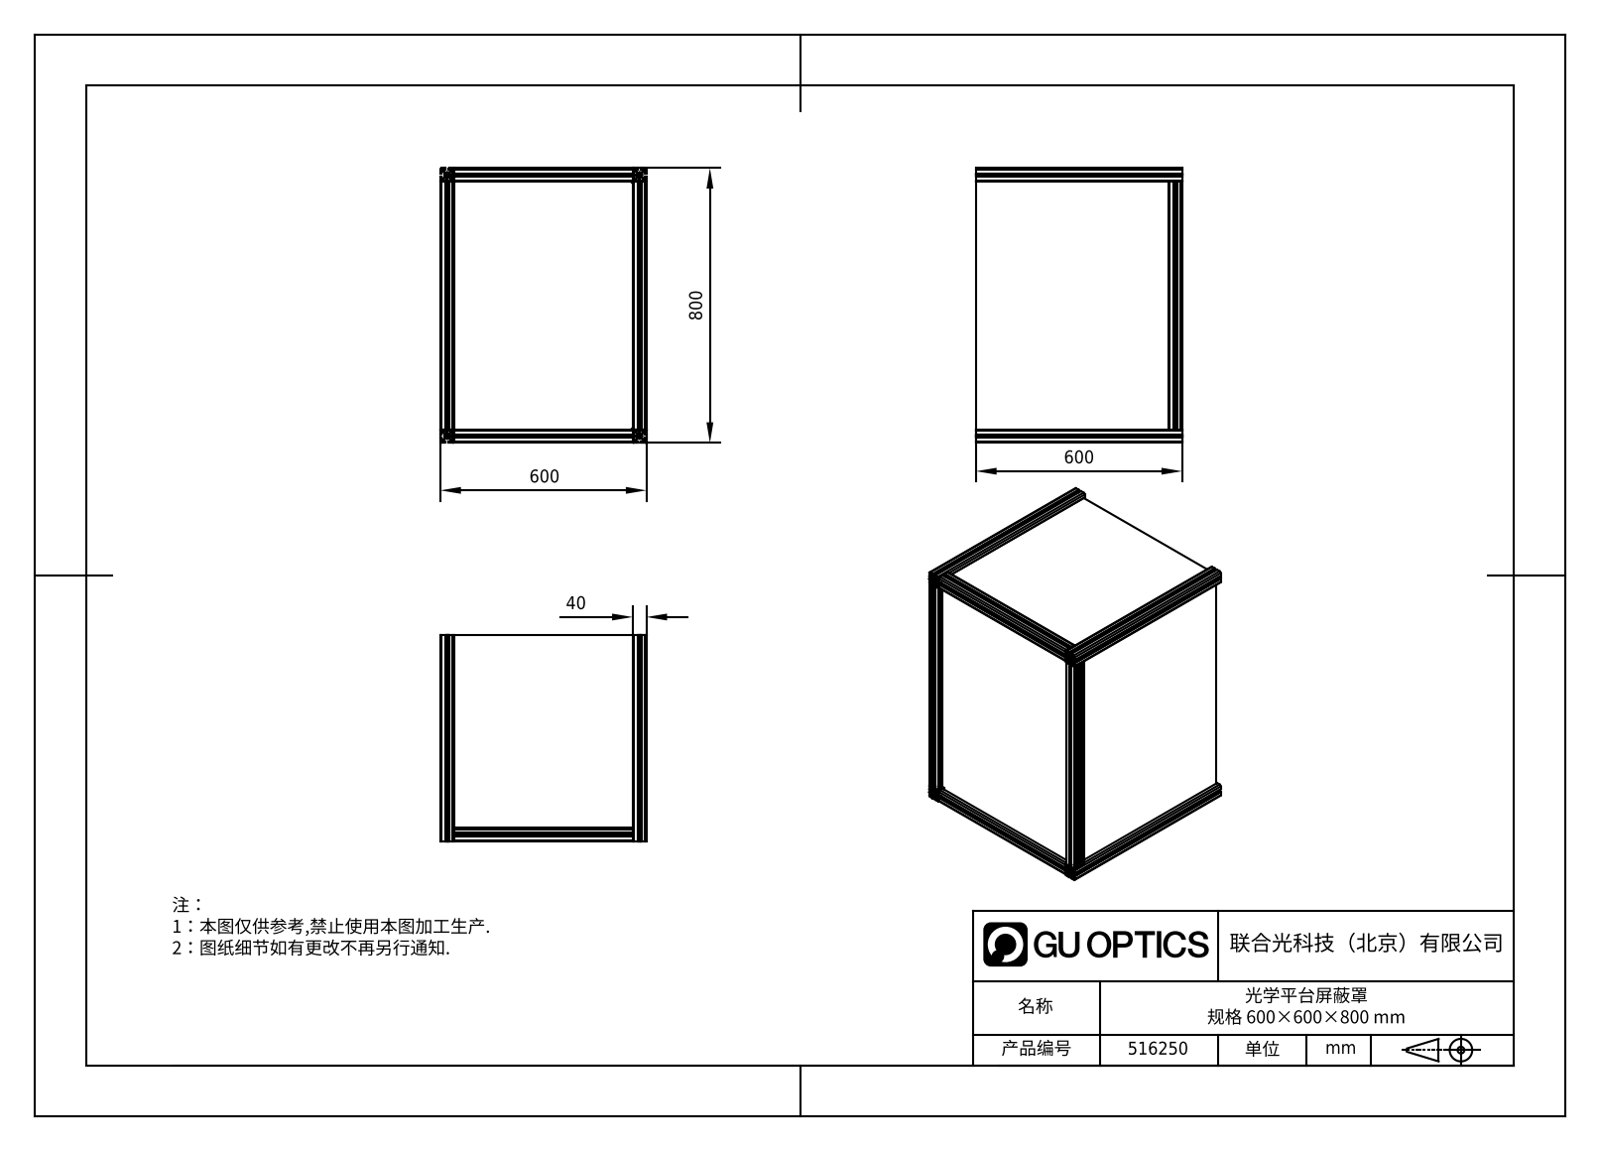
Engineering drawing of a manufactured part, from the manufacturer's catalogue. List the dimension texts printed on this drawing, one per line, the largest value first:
800
600
600
40
